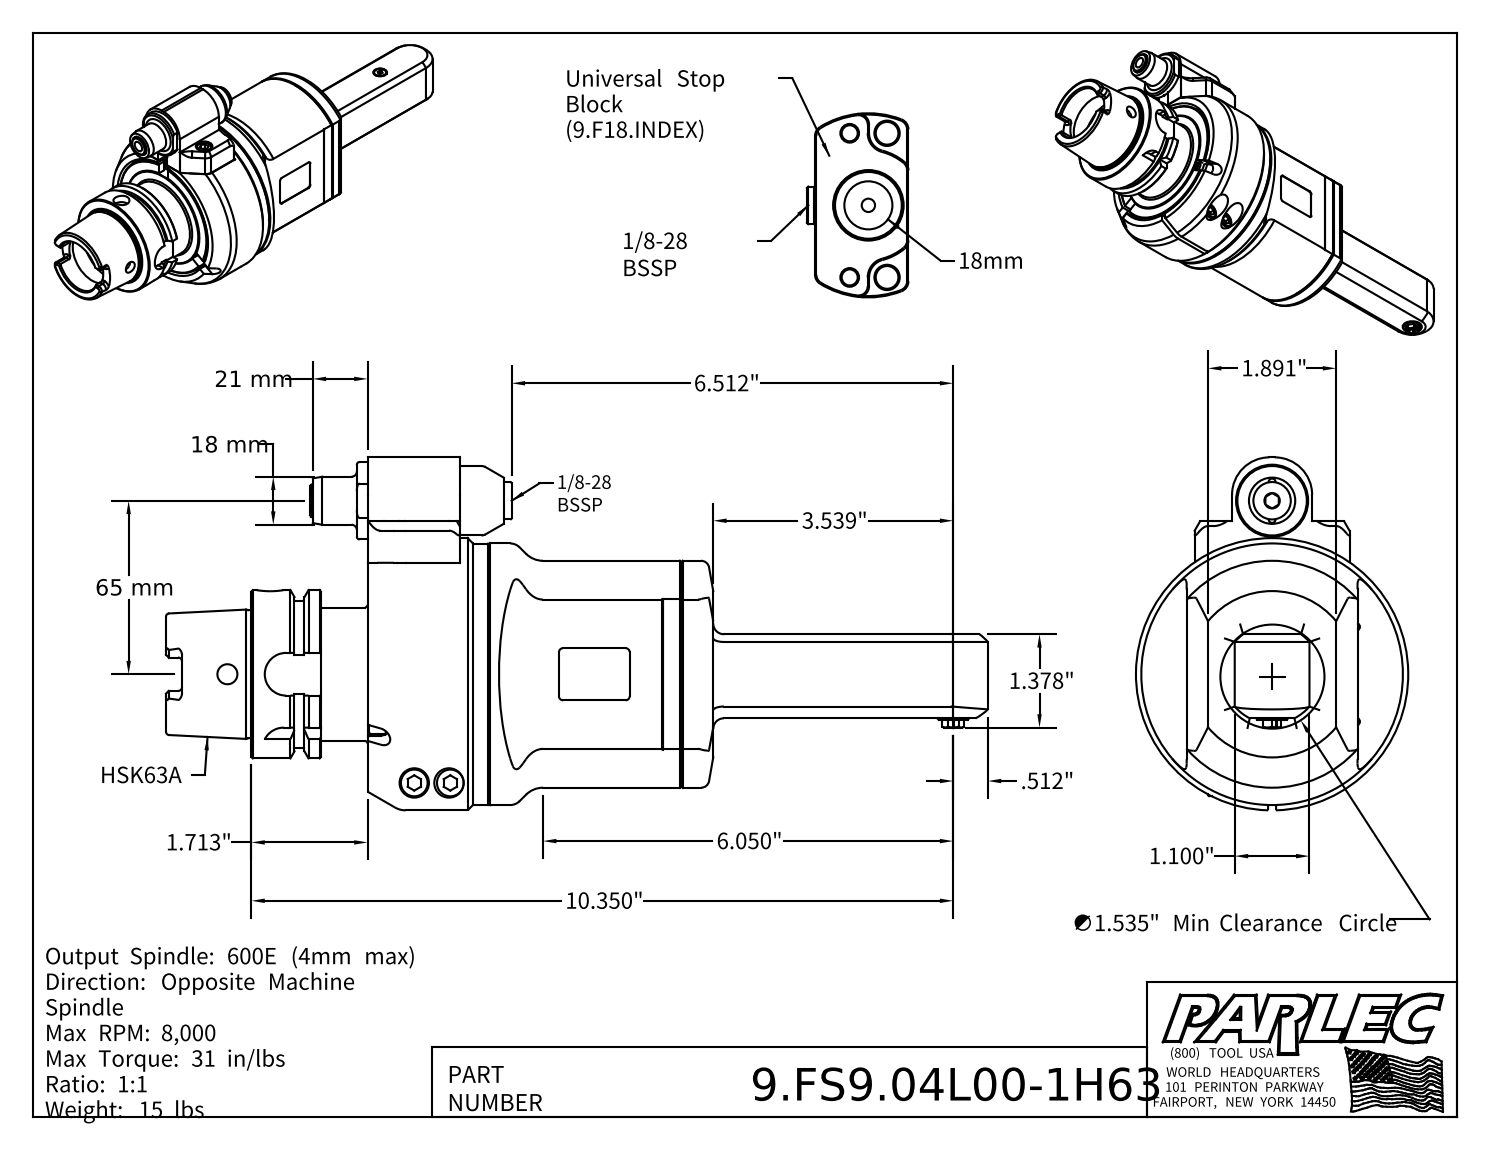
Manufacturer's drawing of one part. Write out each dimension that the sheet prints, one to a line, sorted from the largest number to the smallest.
65 mm
21 mm
18 mm
10.350"
6.512"
6.050"
3.539"
1.891"
1.713"
∅1.535" Min Clearance Circle
1.378"
1.100"
.512"
